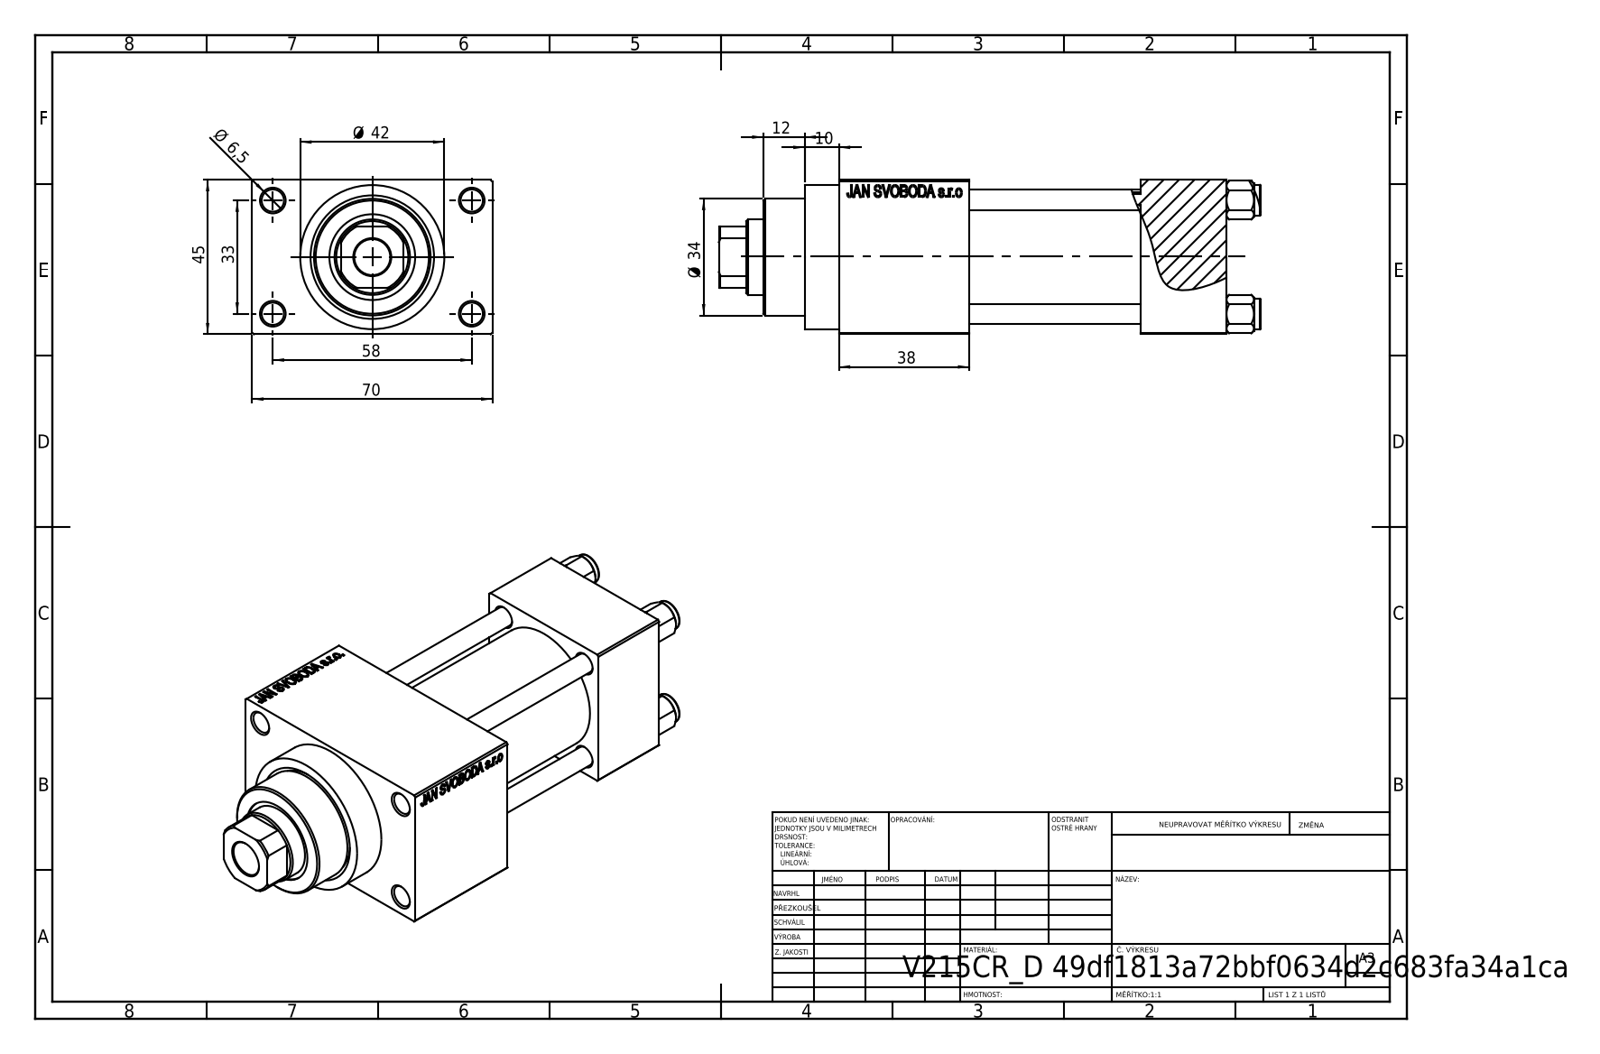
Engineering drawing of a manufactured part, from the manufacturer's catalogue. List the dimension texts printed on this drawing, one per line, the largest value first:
70
58
45
Ø 42
38
Ø 34
33
12
10
Ø 6,5
